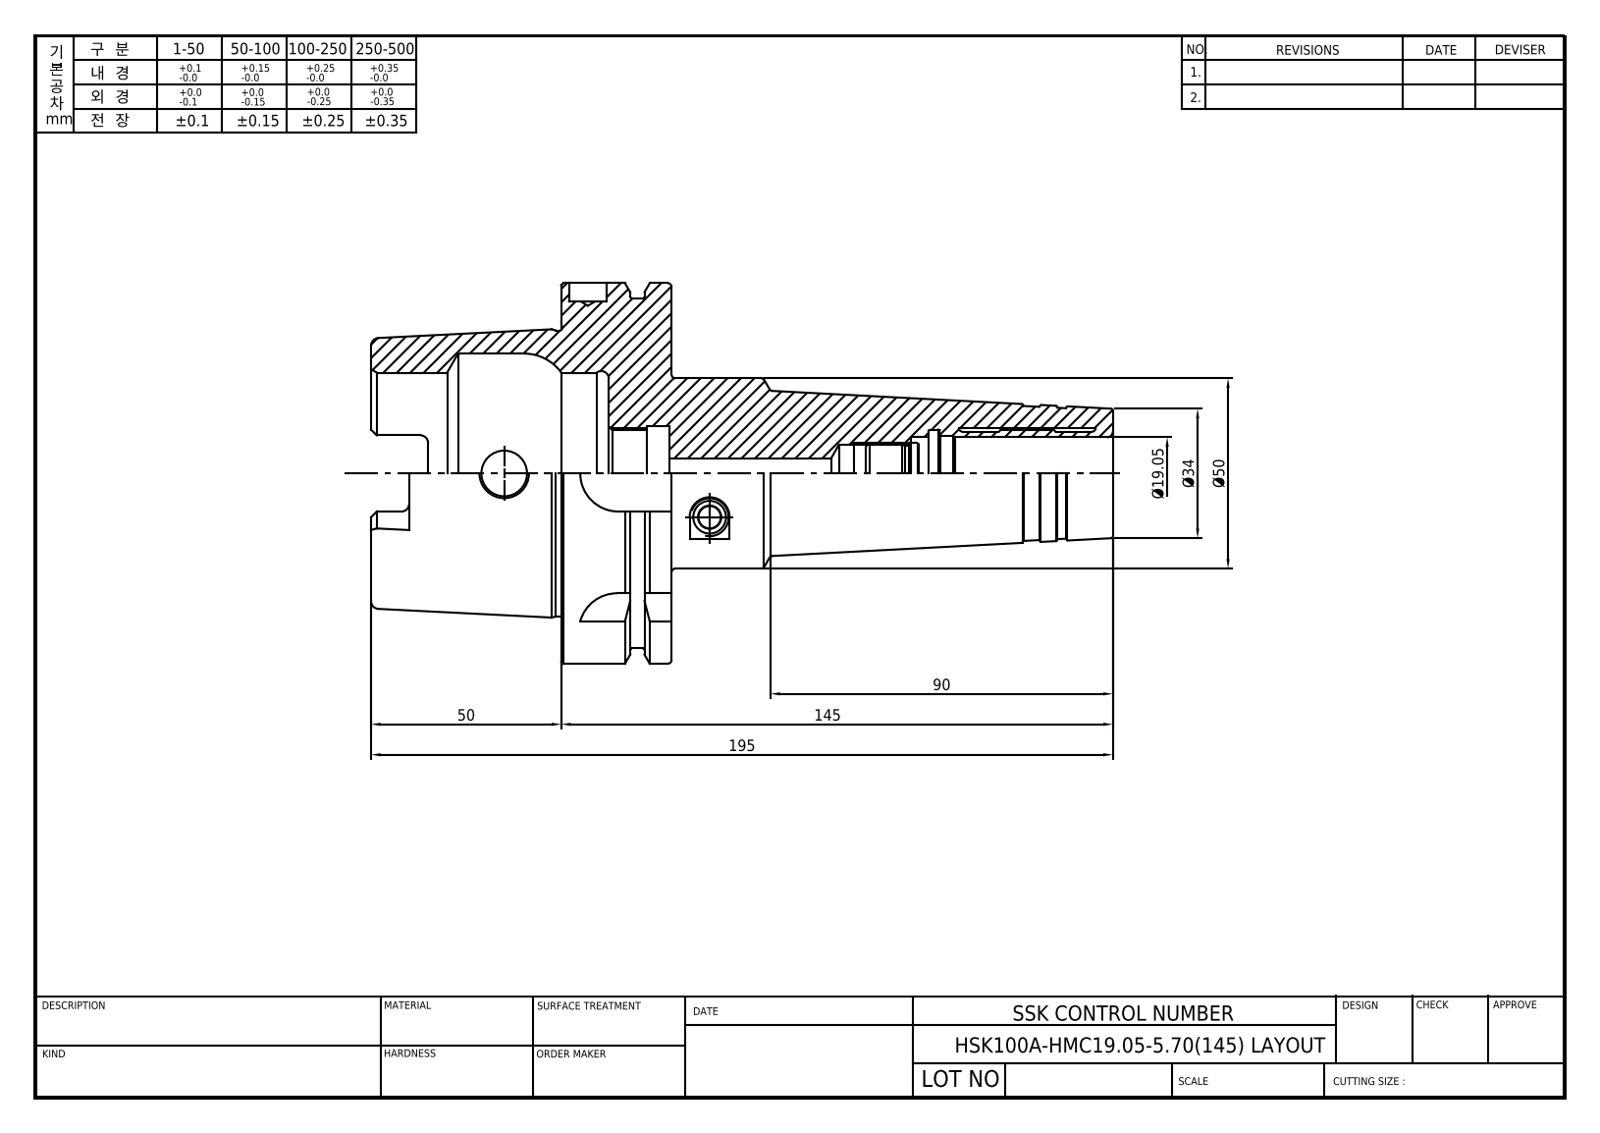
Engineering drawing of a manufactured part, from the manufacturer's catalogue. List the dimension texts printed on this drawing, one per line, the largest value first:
195
145
90
50
Ø50
Ø34
Ø19.05
